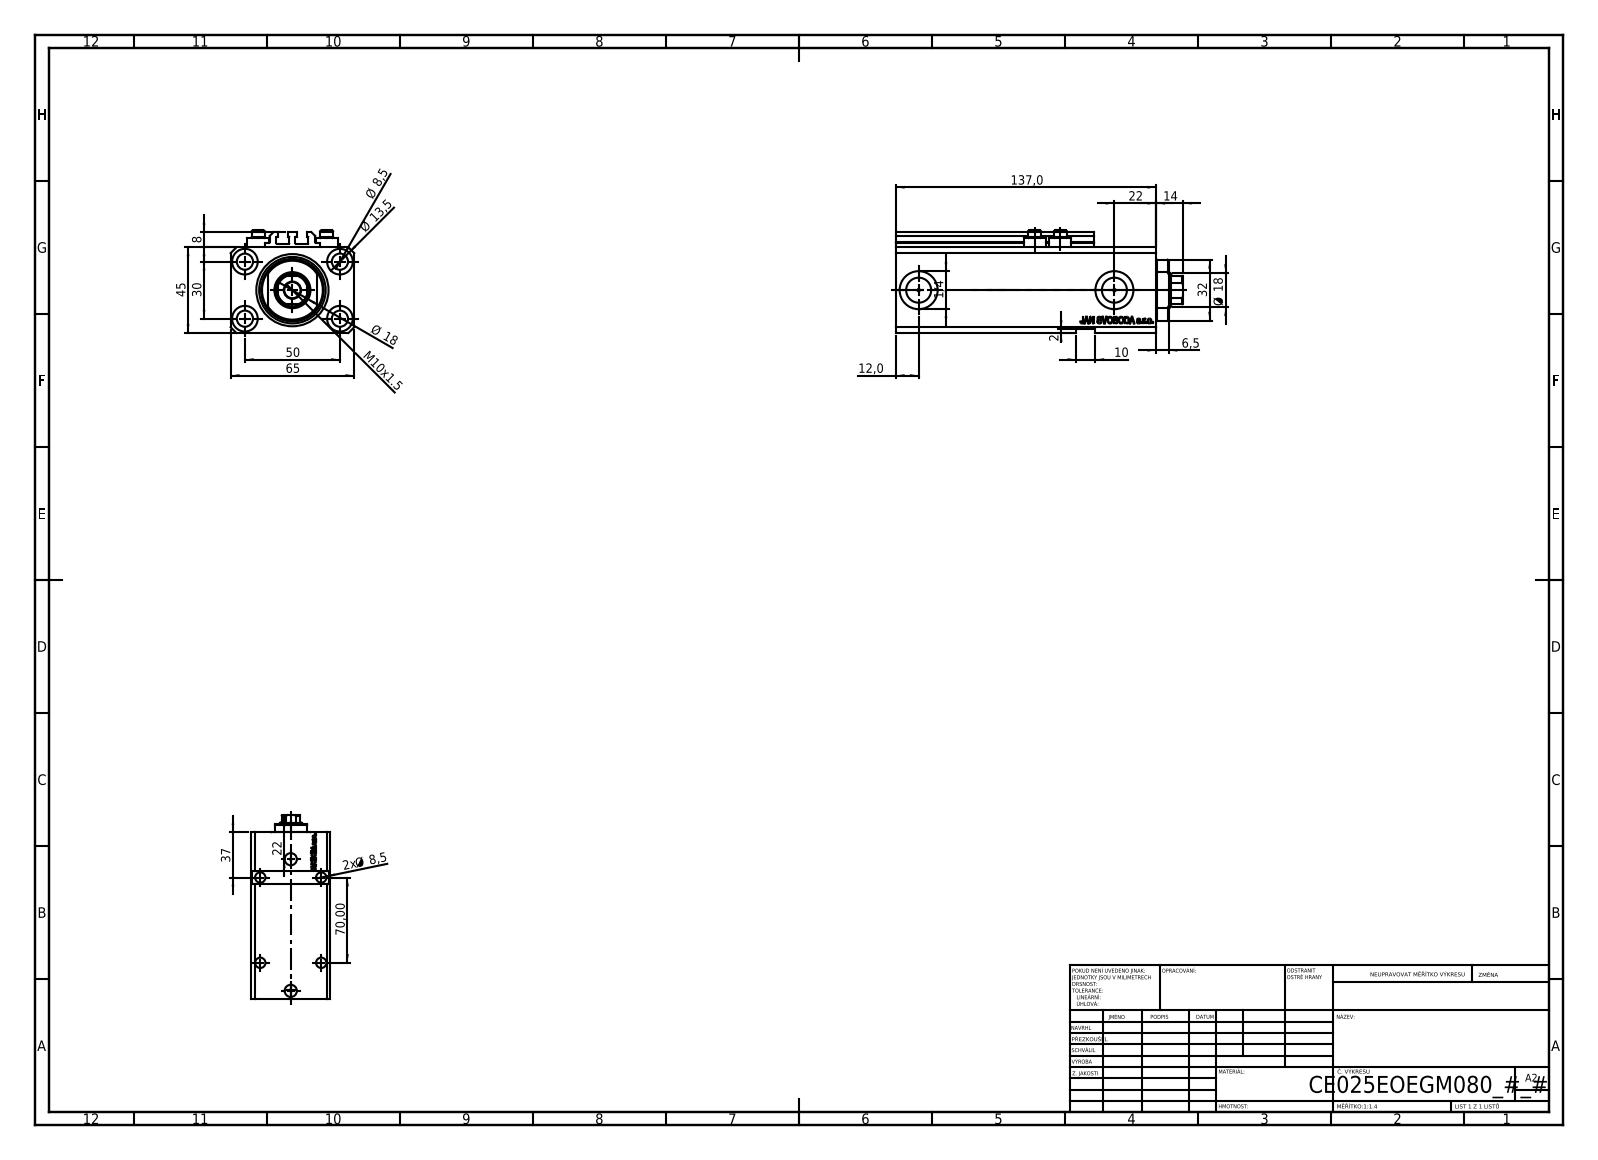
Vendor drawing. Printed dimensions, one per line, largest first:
137,0
70,00
65
50
45
37
32
30
22
22
Ø 18
Ø 18
14
Ø 13,5
12,0
M10x1.5
10
Ø 8,5
2x Ø 8,5
8
6,5
2
1/4
